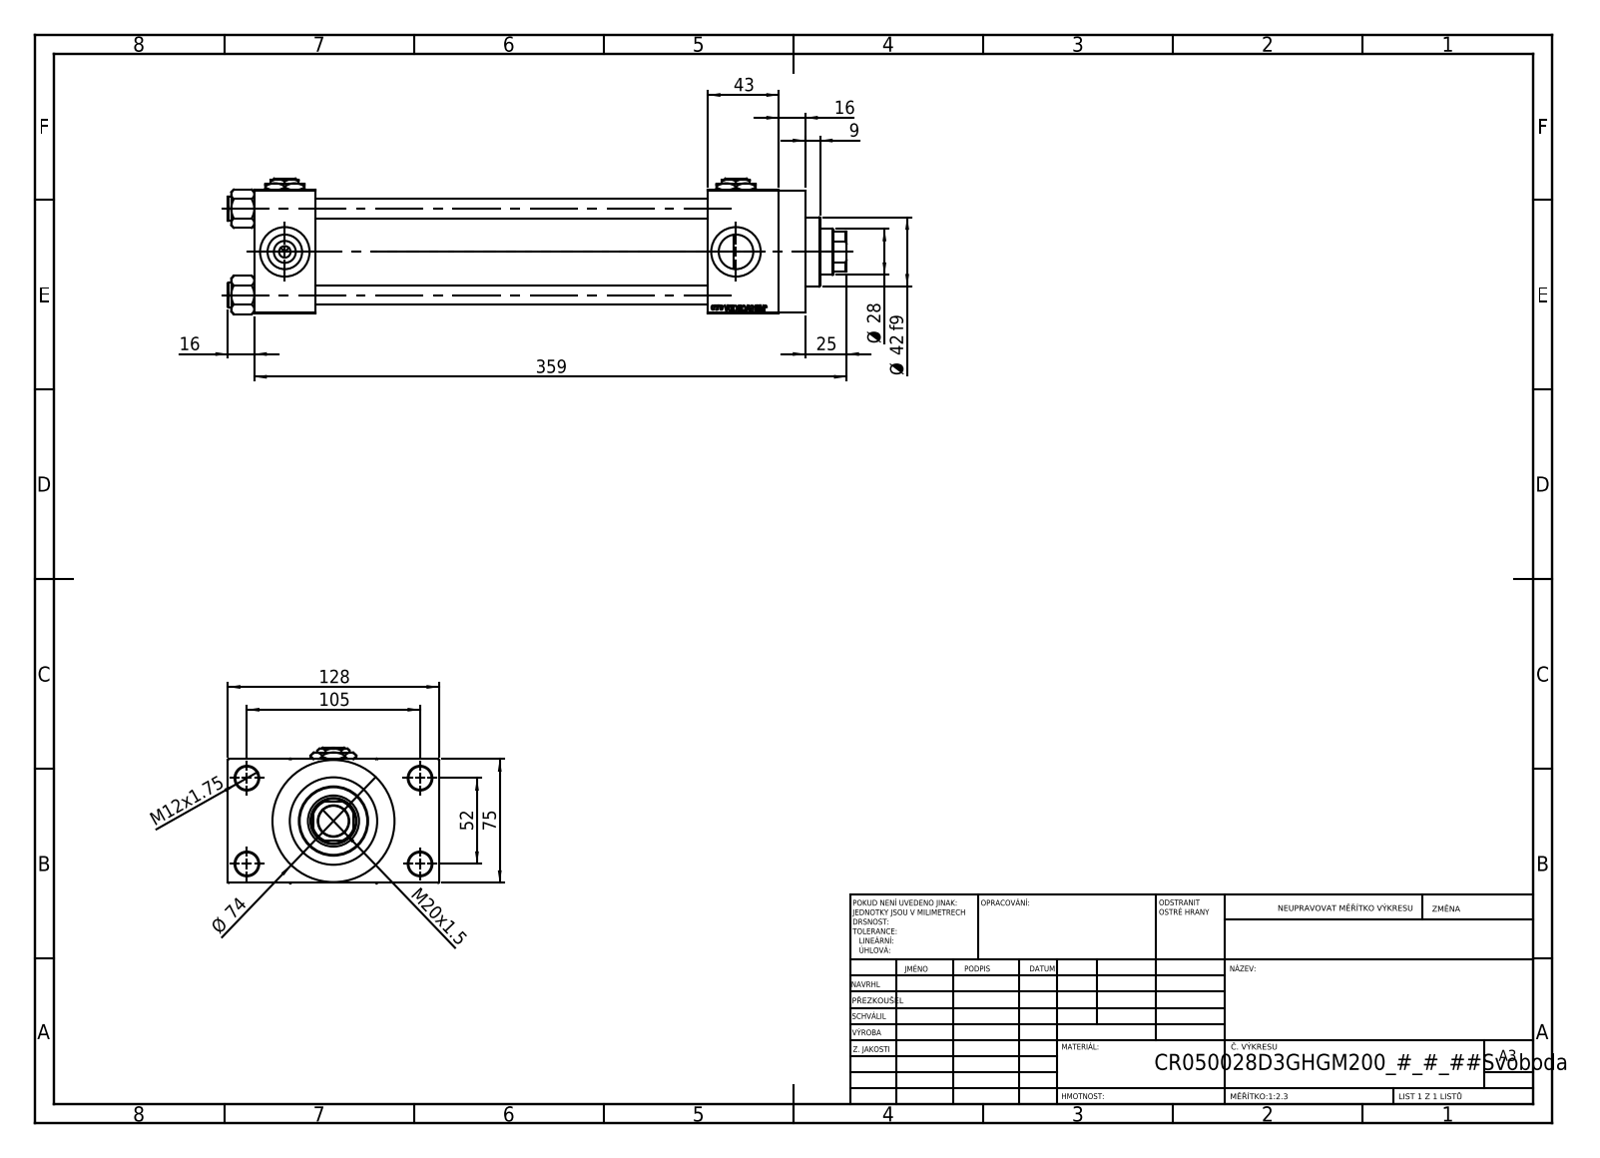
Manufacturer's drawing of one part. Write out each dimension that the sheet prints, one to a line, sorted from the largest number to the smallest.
359
128
105
75
Ø 74
52
43
Ø 42 f9
Ø 28
25
M20x1.5
16
16
M12x1.75
9
